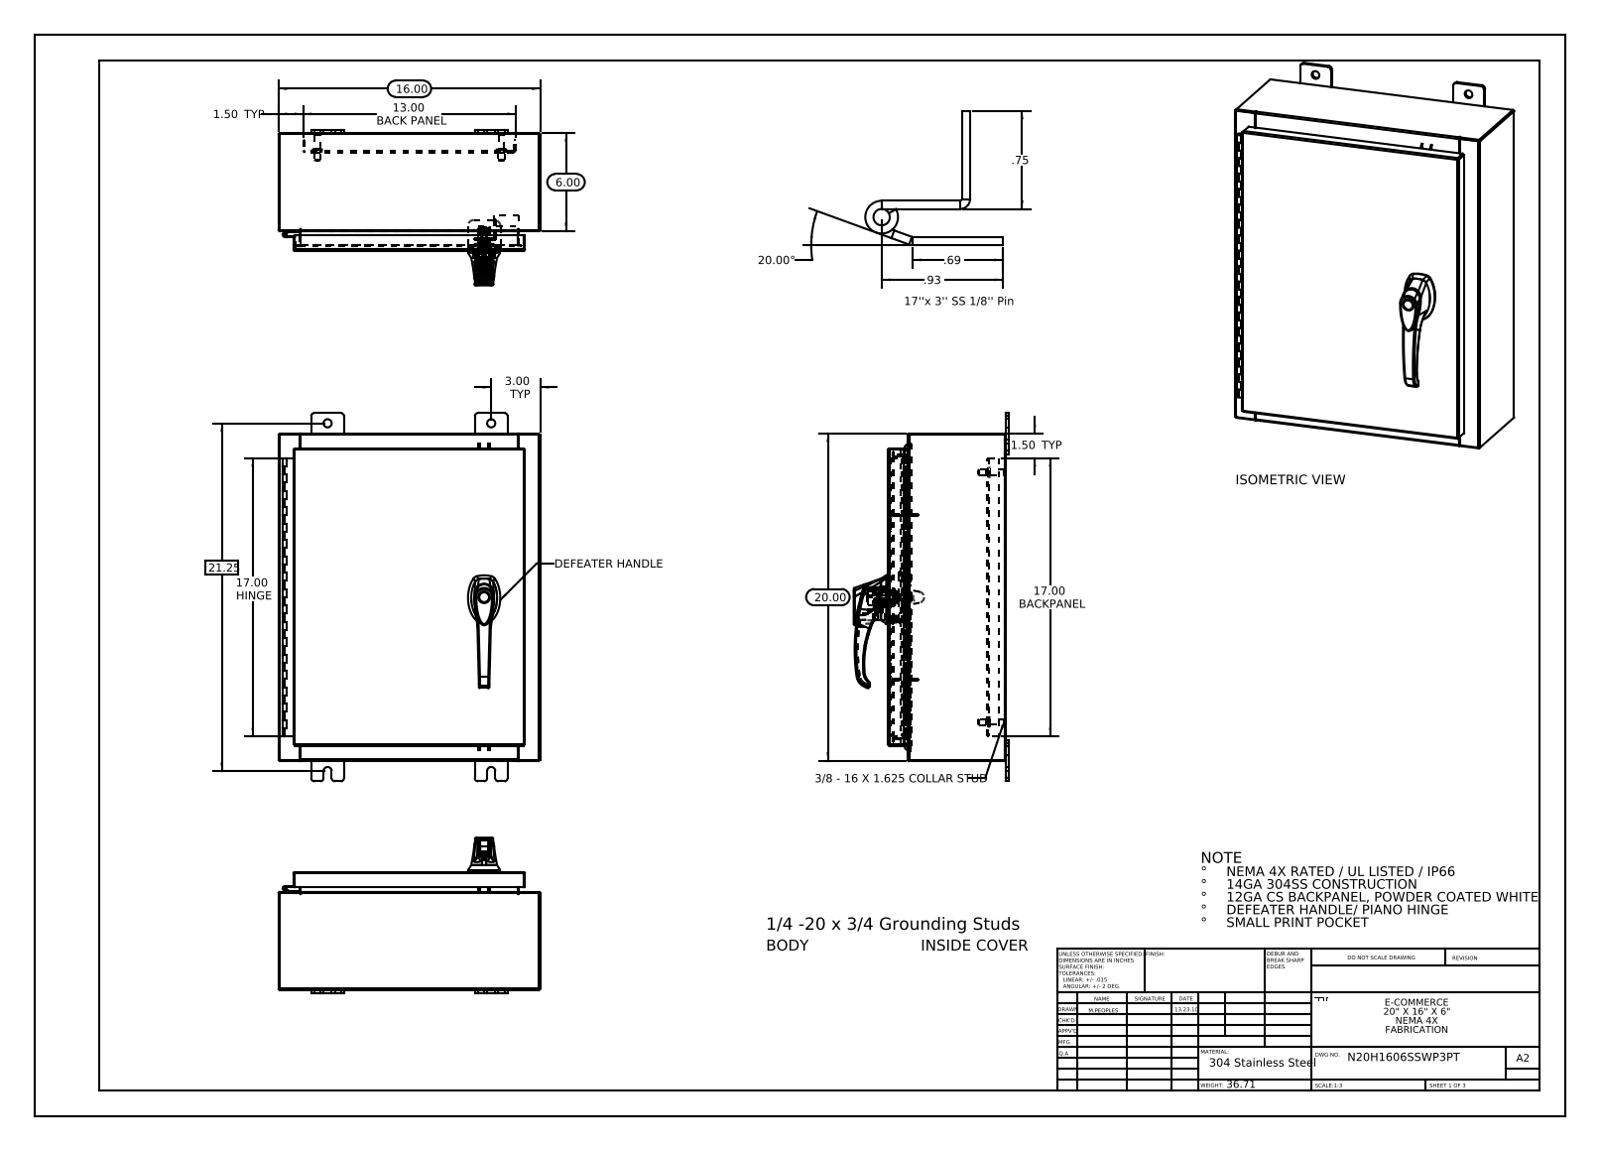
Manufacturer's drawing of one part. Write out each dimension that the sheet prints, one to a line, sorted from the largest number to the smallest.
21.25
20.00
20.00°
17.00 HINGE
17.00 BACKPANEL
16.00
13.00 BACK PANEL
6.00
3.00 TYP
1.50 TYP
1.50 TYP
.93
.75
.69
